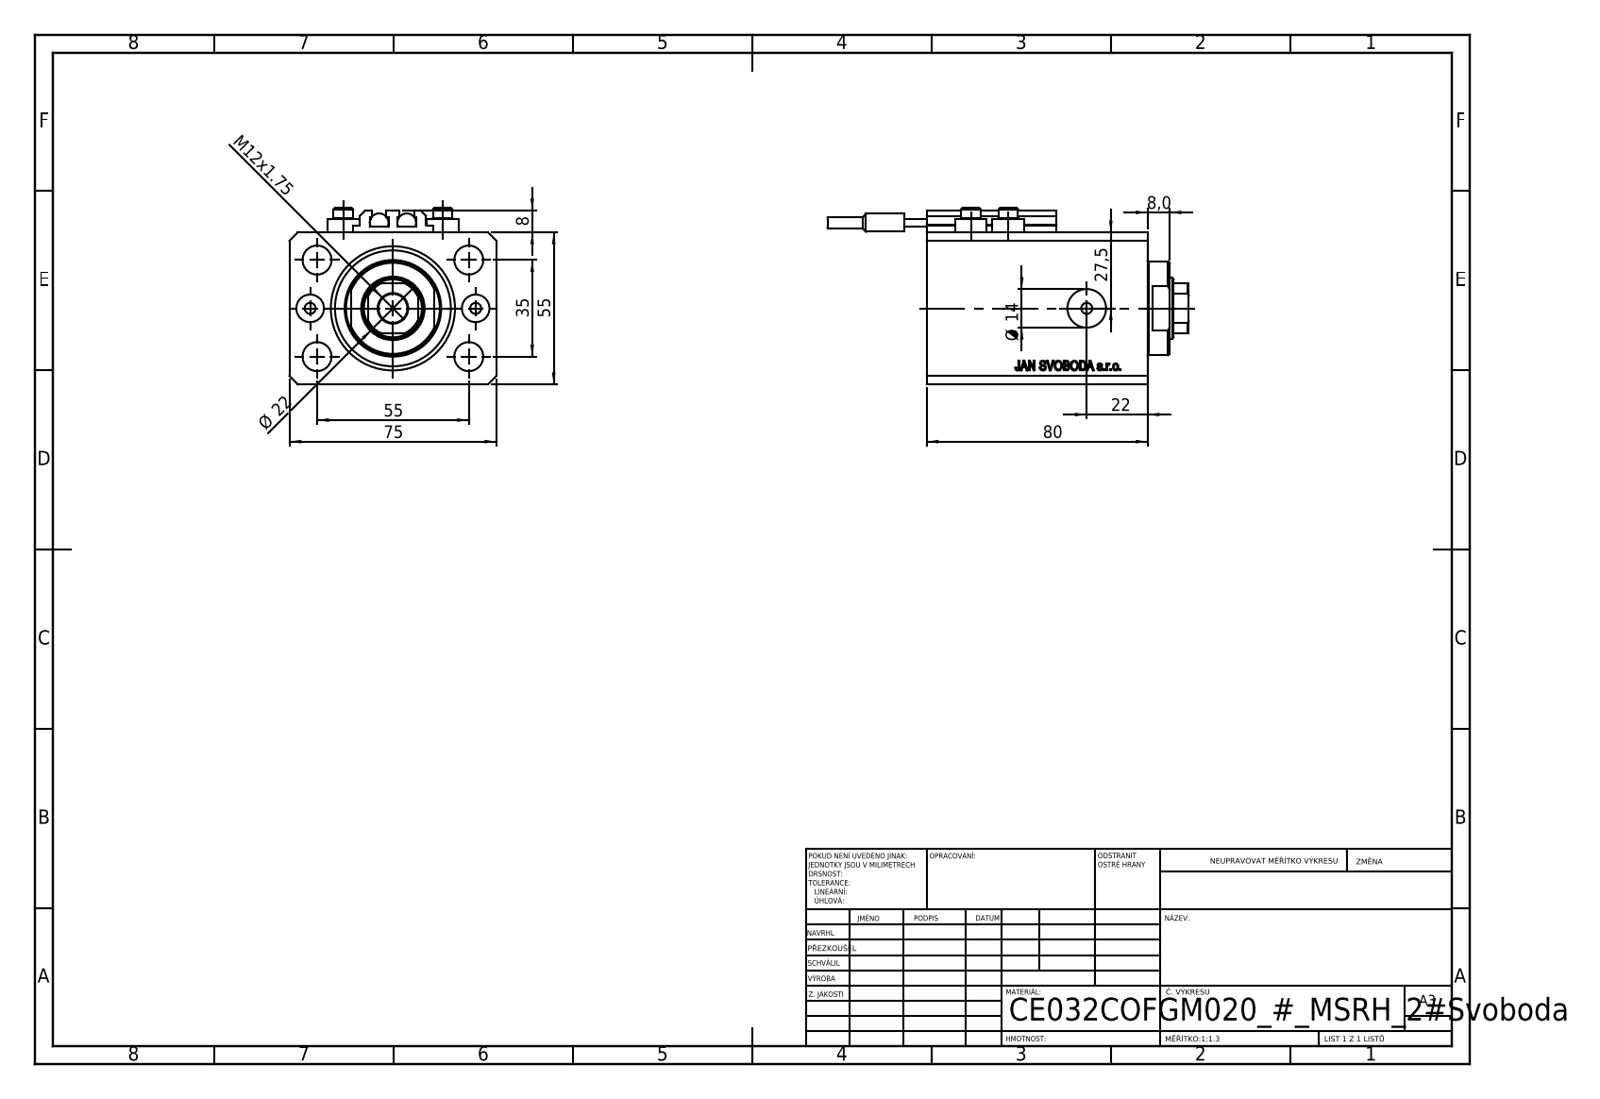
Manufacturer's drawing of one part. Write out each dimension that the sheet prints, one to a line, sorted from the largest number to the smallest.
80
75
55
55
35
27,5
Ø 22
22
Ø 14
M12x1.75
8
8,0
